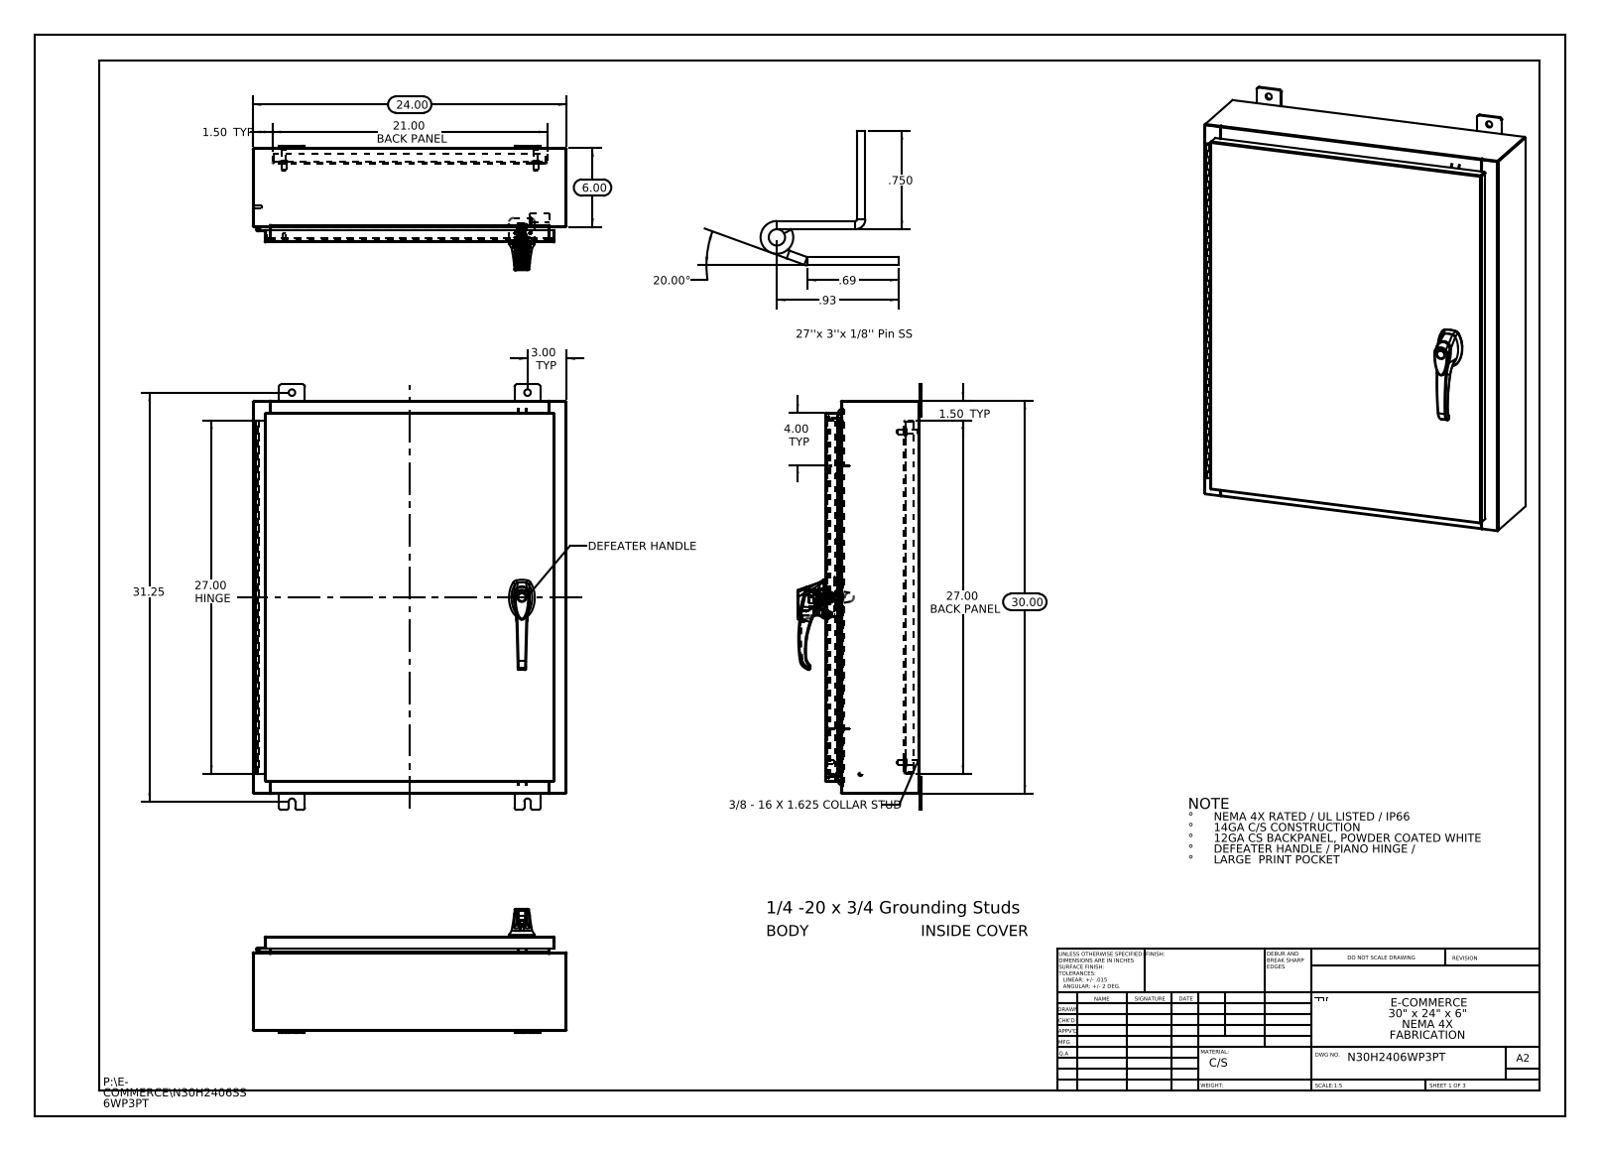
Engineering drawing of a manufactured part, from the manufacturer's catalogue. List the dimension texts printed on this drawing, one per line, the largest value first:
31.25
30.00
27.00 HINGE
27.00 BACK PANEL
24.00
21.00 BACK PANEL
20.00°
6.00
4.00 TYP
3.00 TYP
1.50 TYP
1.50 TYP
.93
.750
.69
